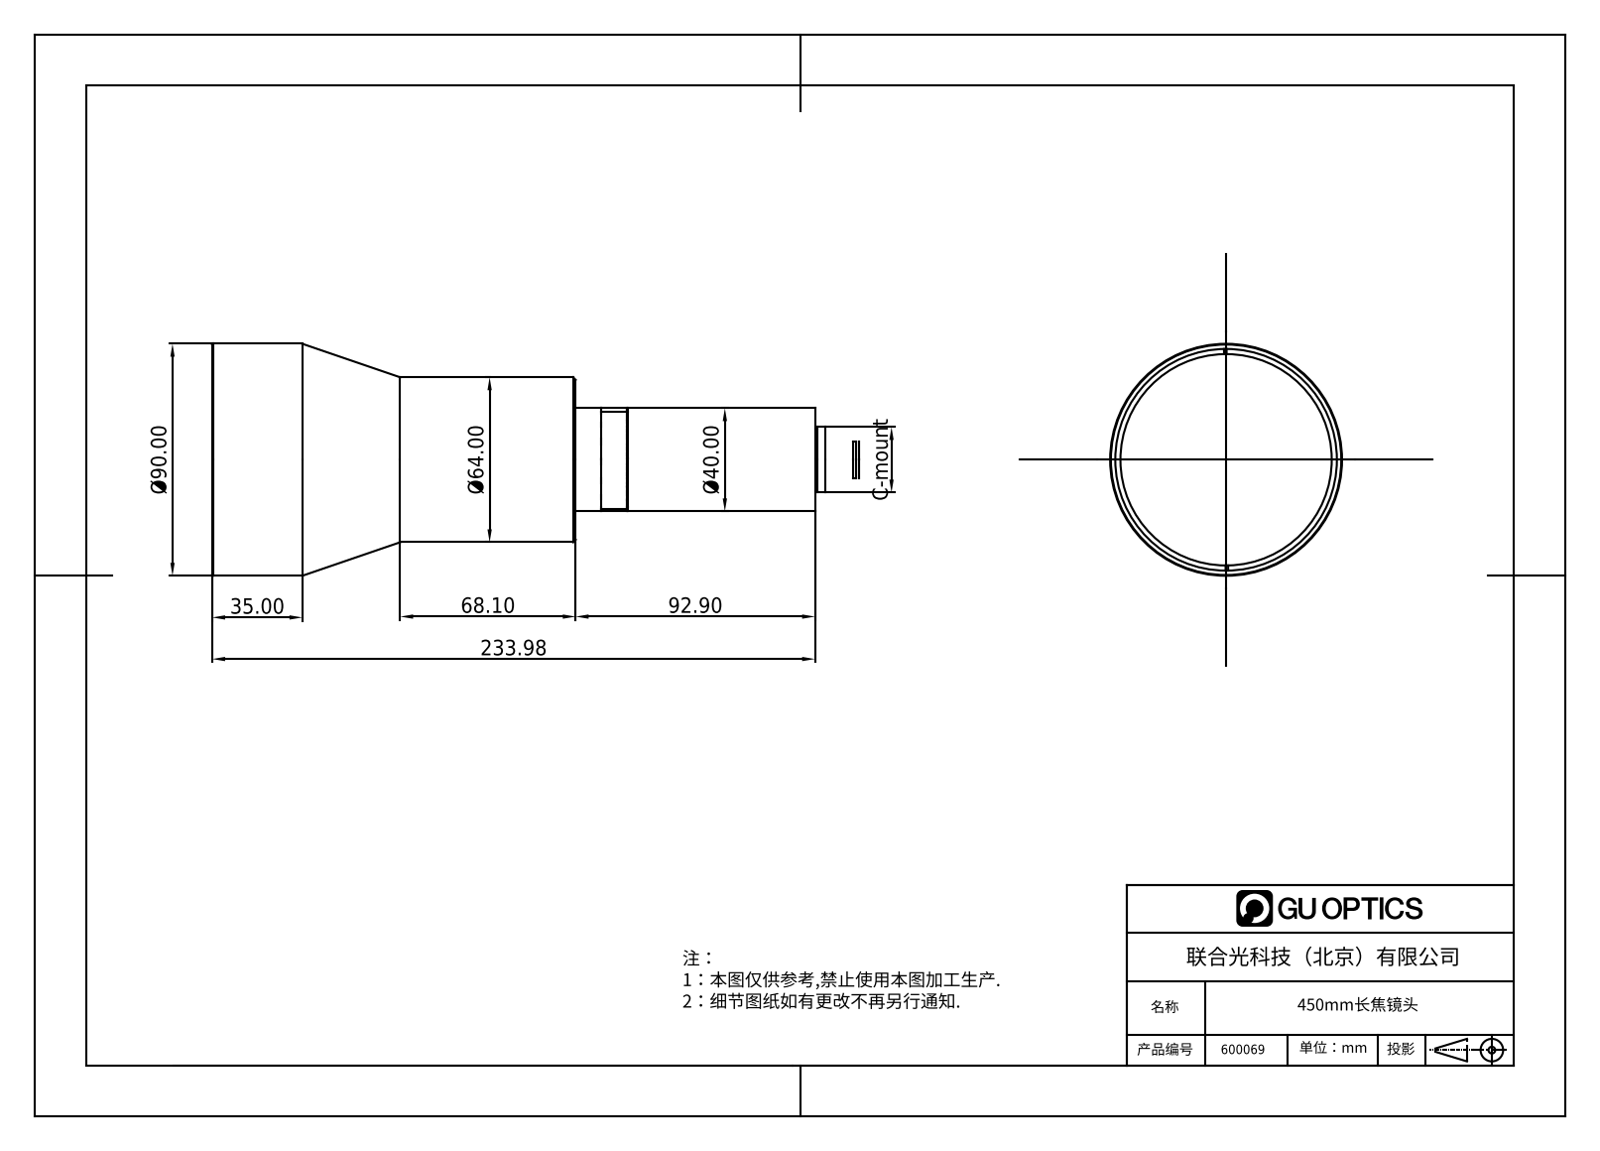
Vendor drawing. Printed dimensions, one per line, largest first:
233.98
92.90
Ø90.00
68.10
Ø64.00
Ø40.00
35.00
C-mount
